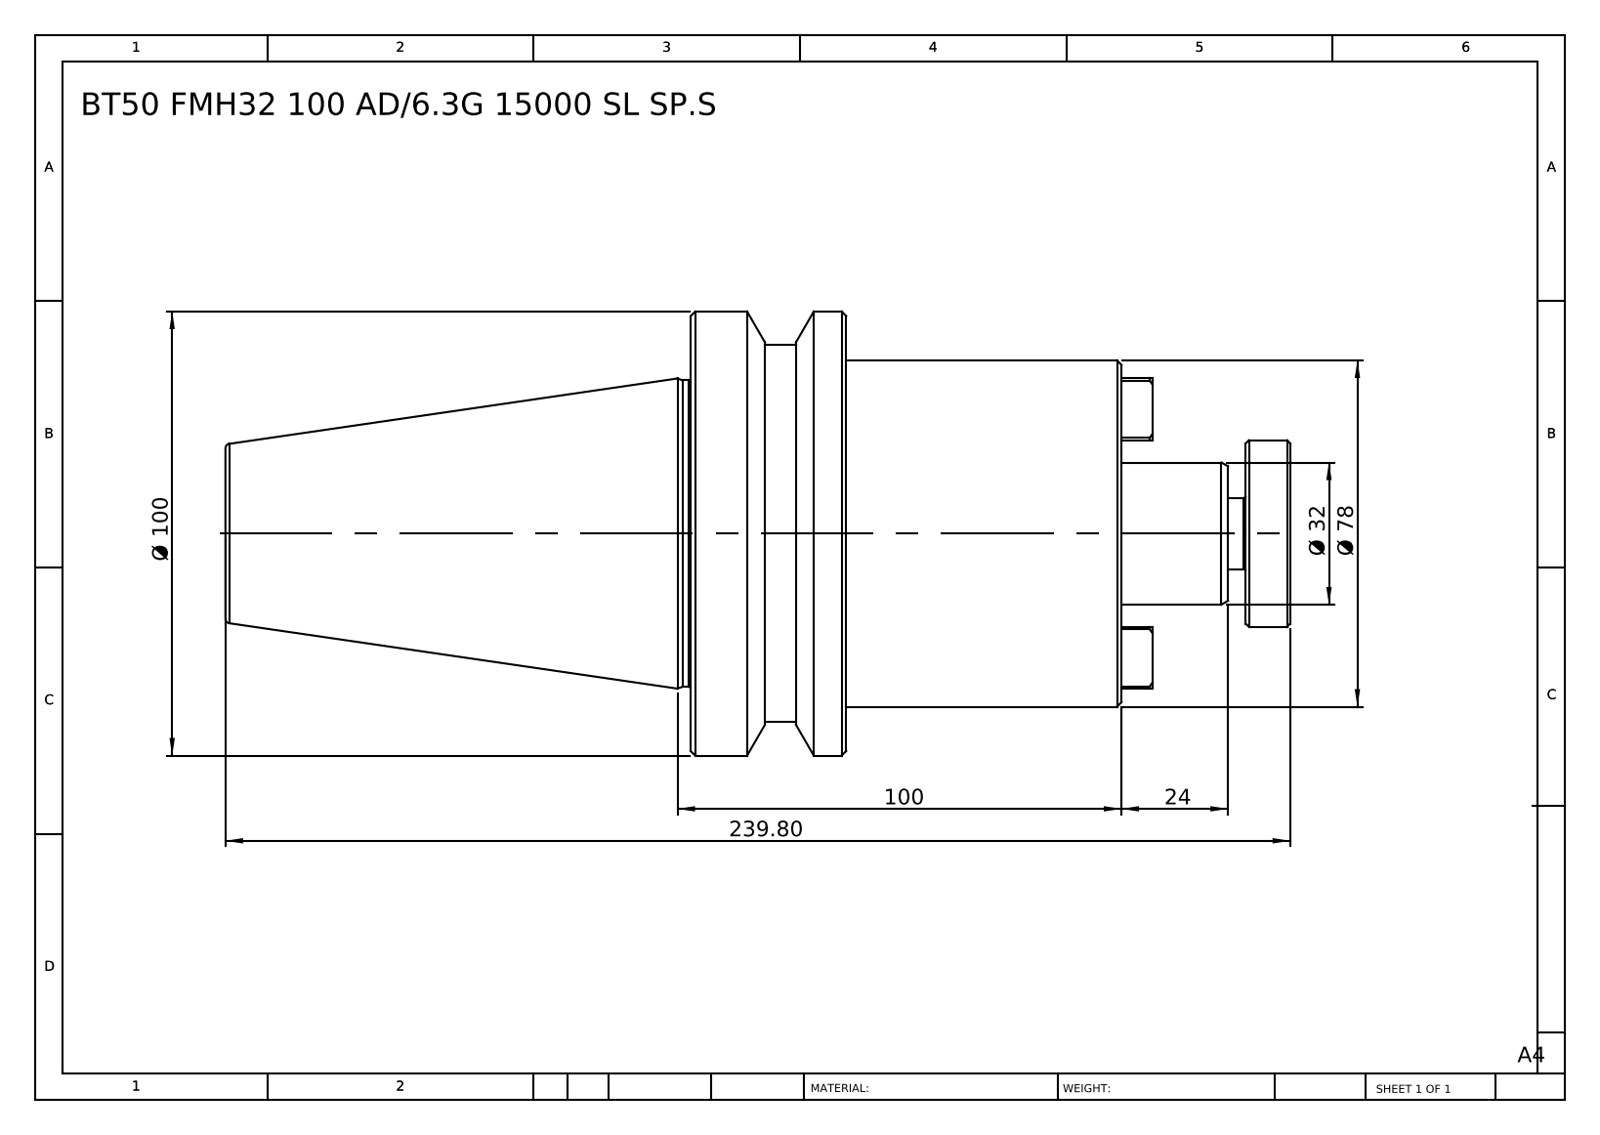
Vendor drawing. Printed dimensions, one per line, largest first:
239.80
100
Ø 100
Ø 78
Ø 32
24
